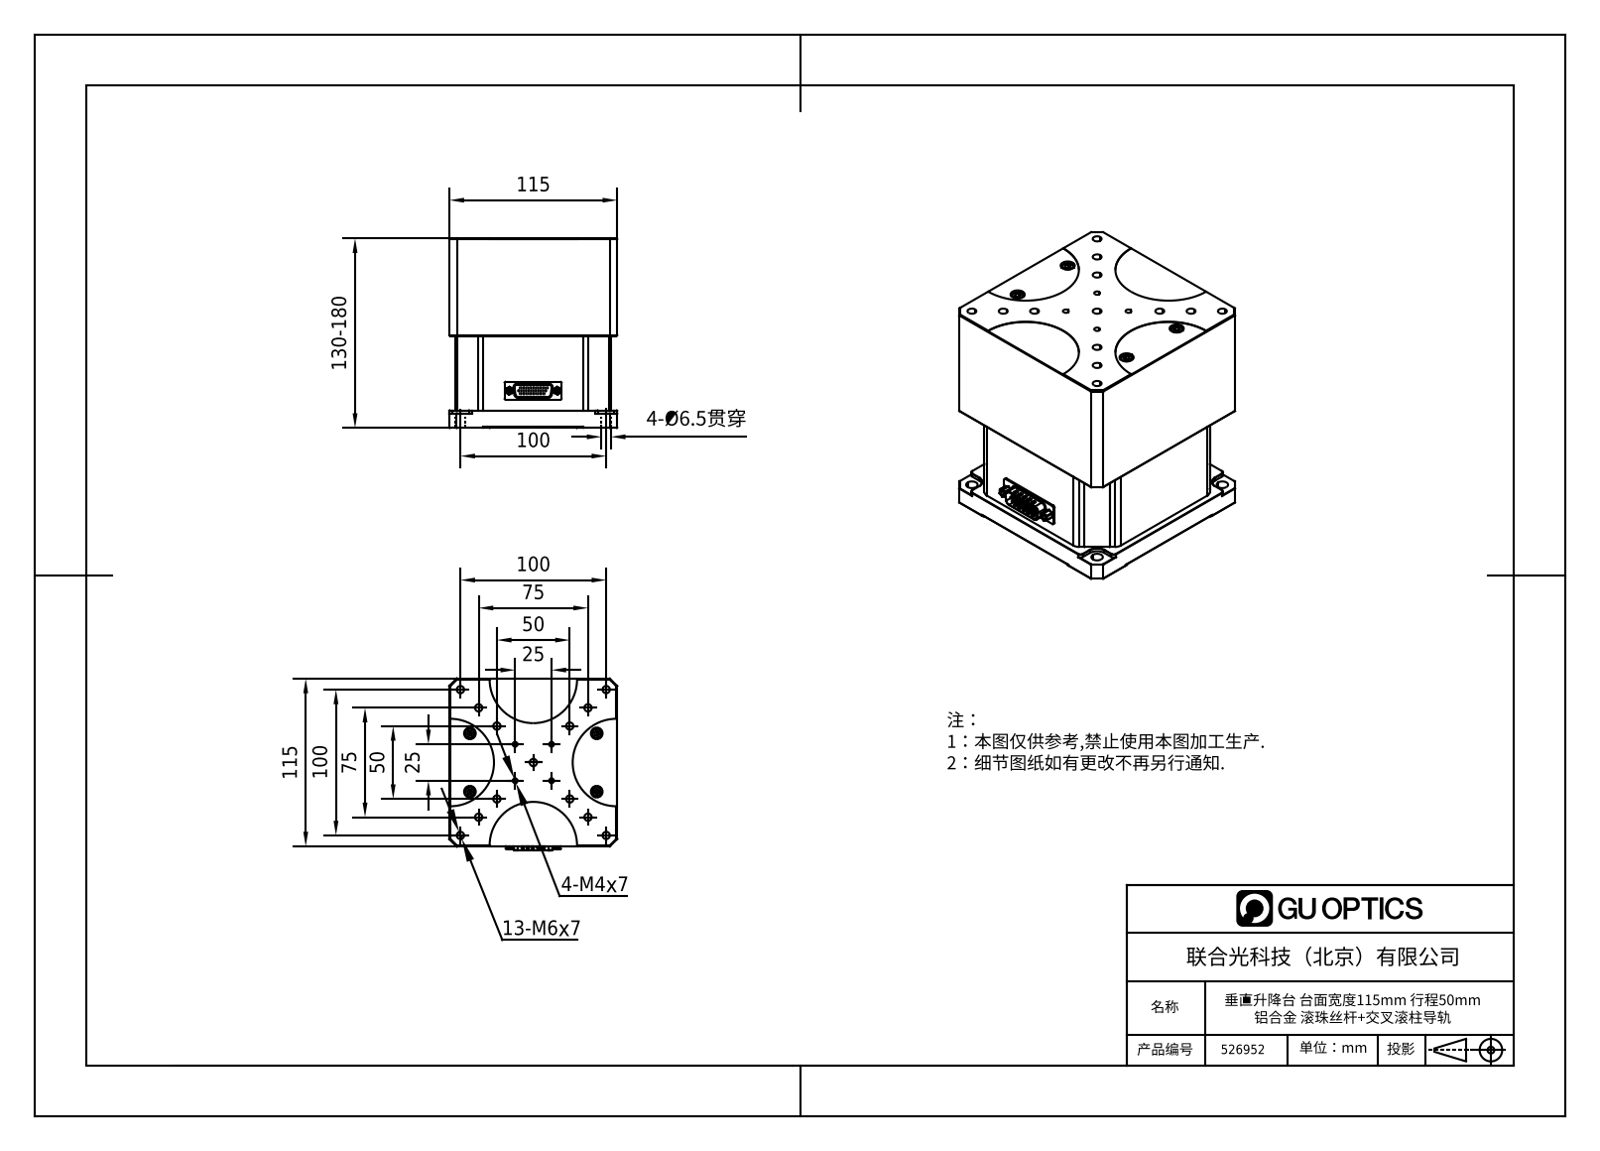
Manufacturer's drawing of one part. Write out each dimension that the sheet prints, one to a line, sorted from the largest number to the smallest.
130-180
115
115
100
100
100
75
75
50
50
25
25
4-Ø6.5贯穿
13-M6x7
4-M4x7
